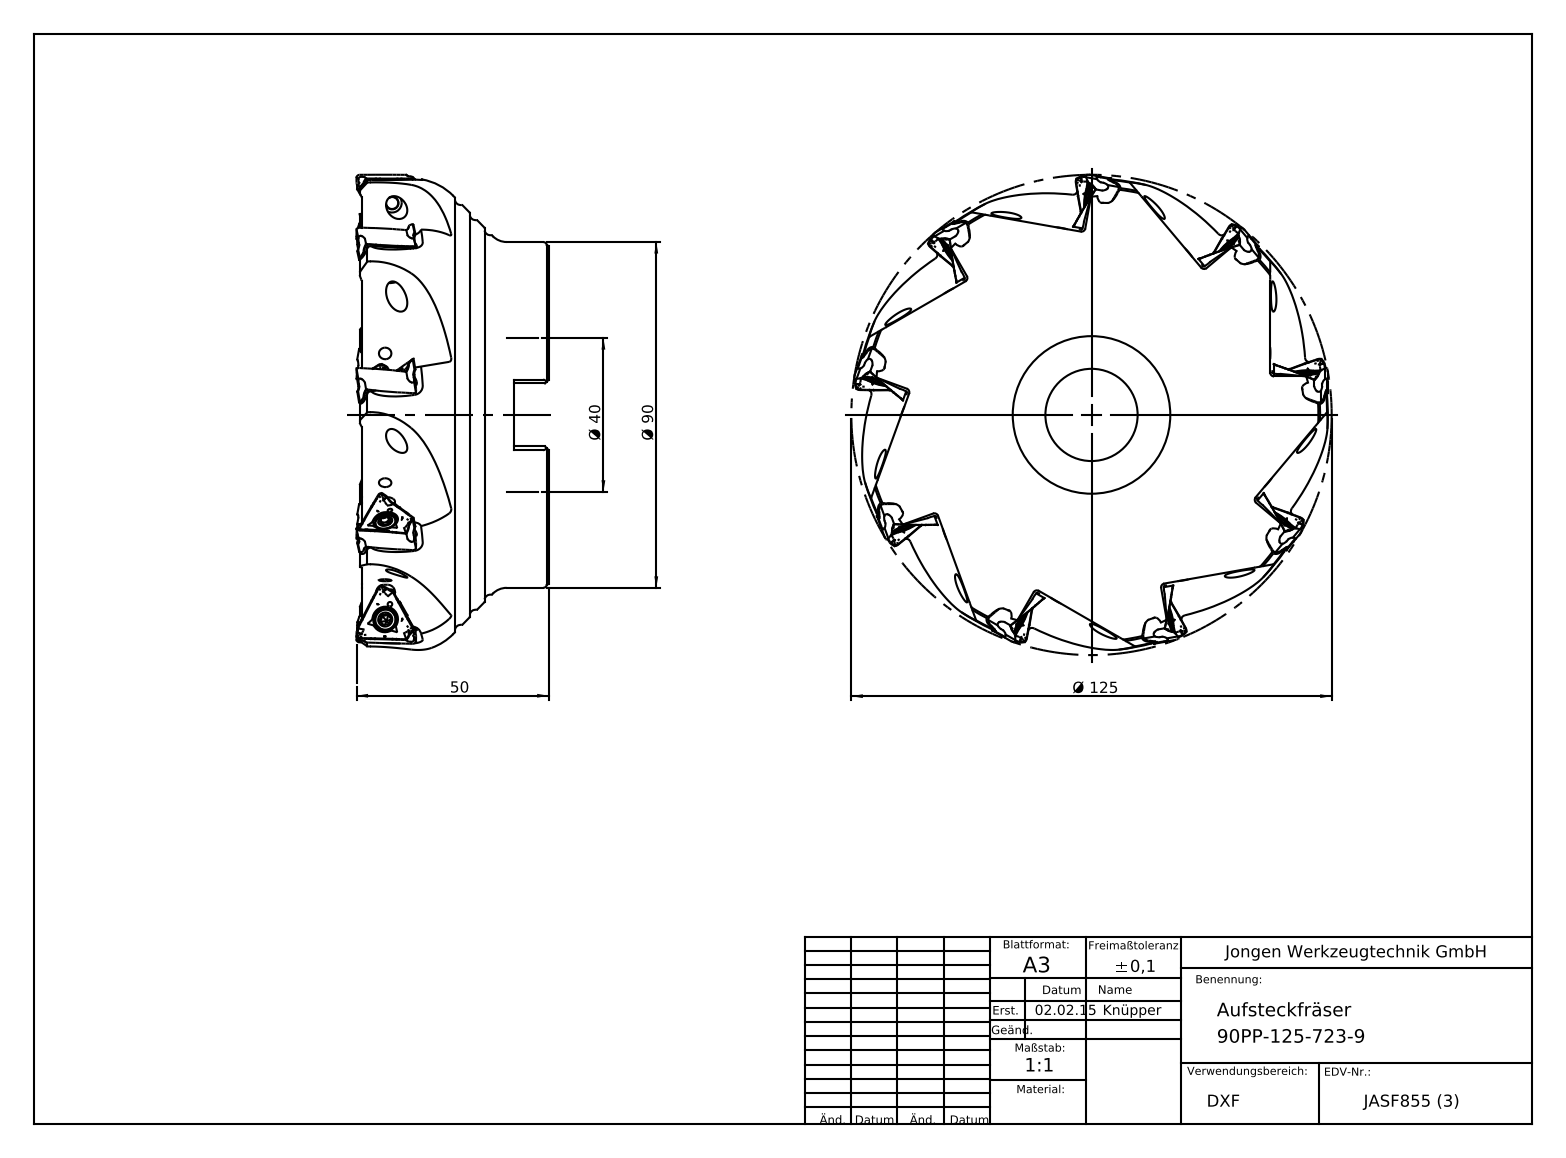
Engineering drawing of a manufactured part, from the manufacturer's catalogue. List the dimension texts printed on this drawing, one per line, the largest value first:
Ø 125
Ø 90
50
Ø 40
